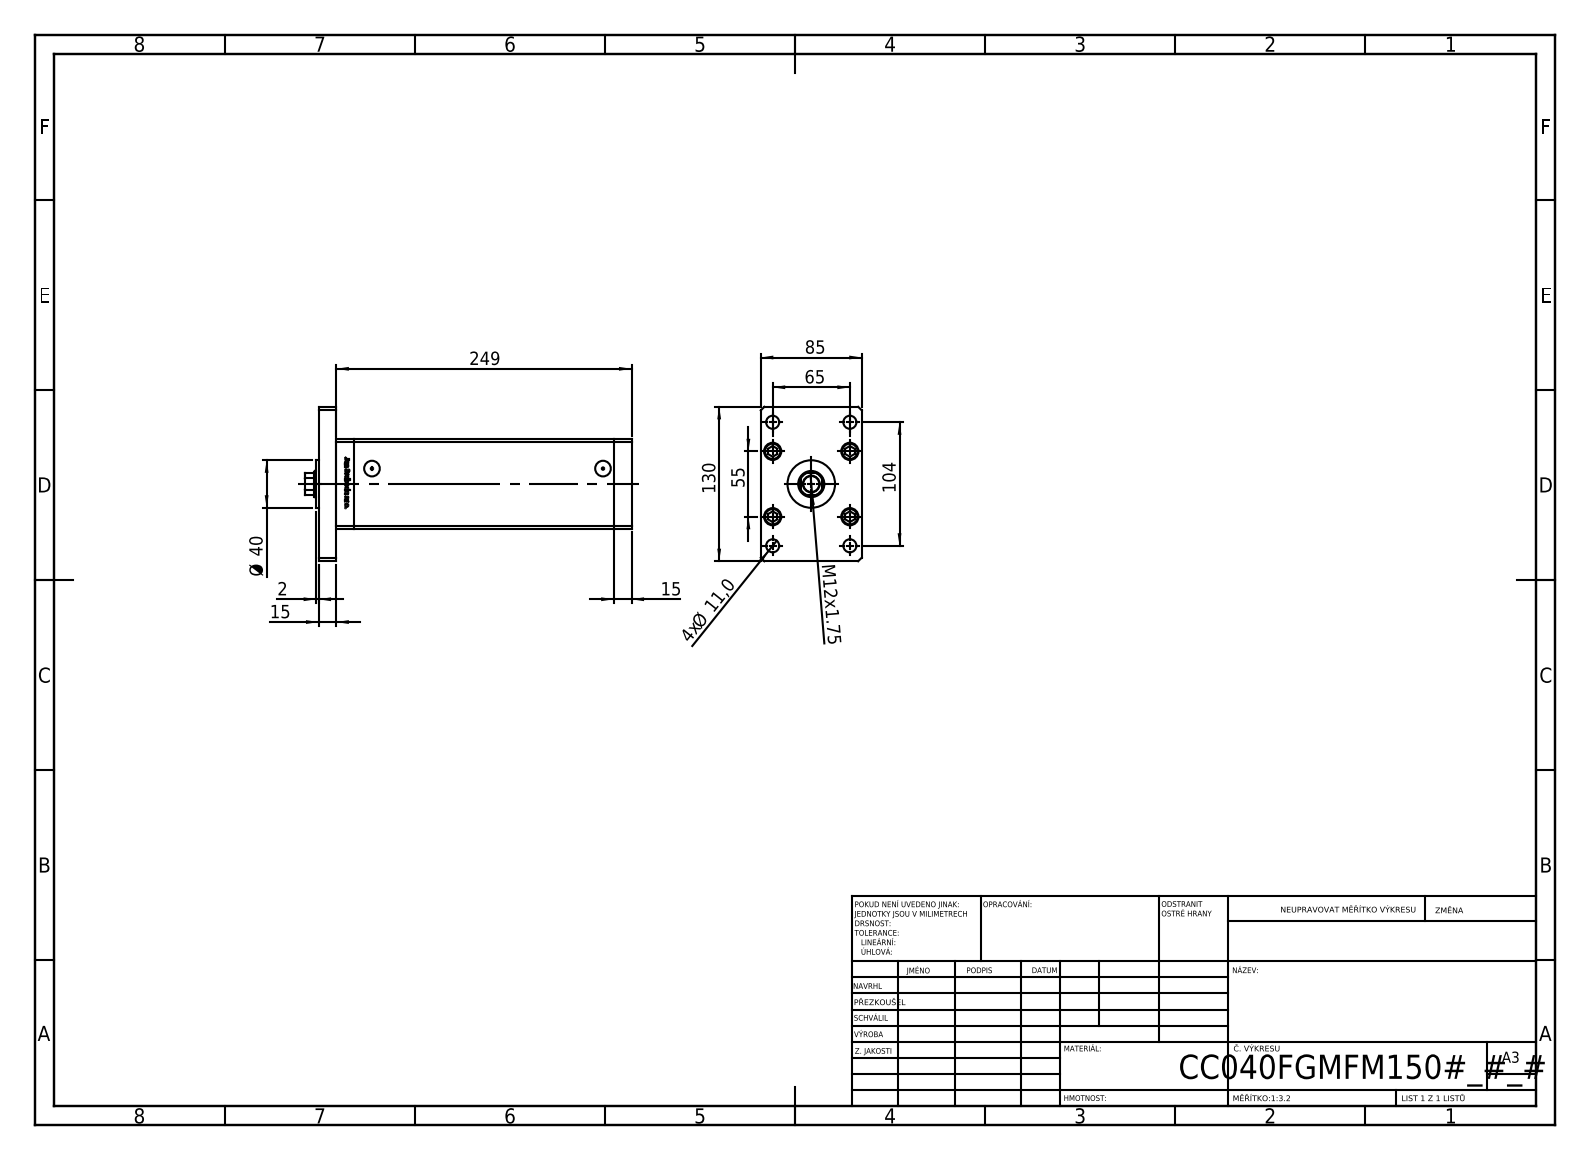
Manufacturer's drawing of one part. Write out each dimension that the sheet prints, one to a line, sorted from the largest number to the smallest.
249
130
104
85
65
55
Ø 40
15
15
M12x1.75
4x Ø 11,0
2
